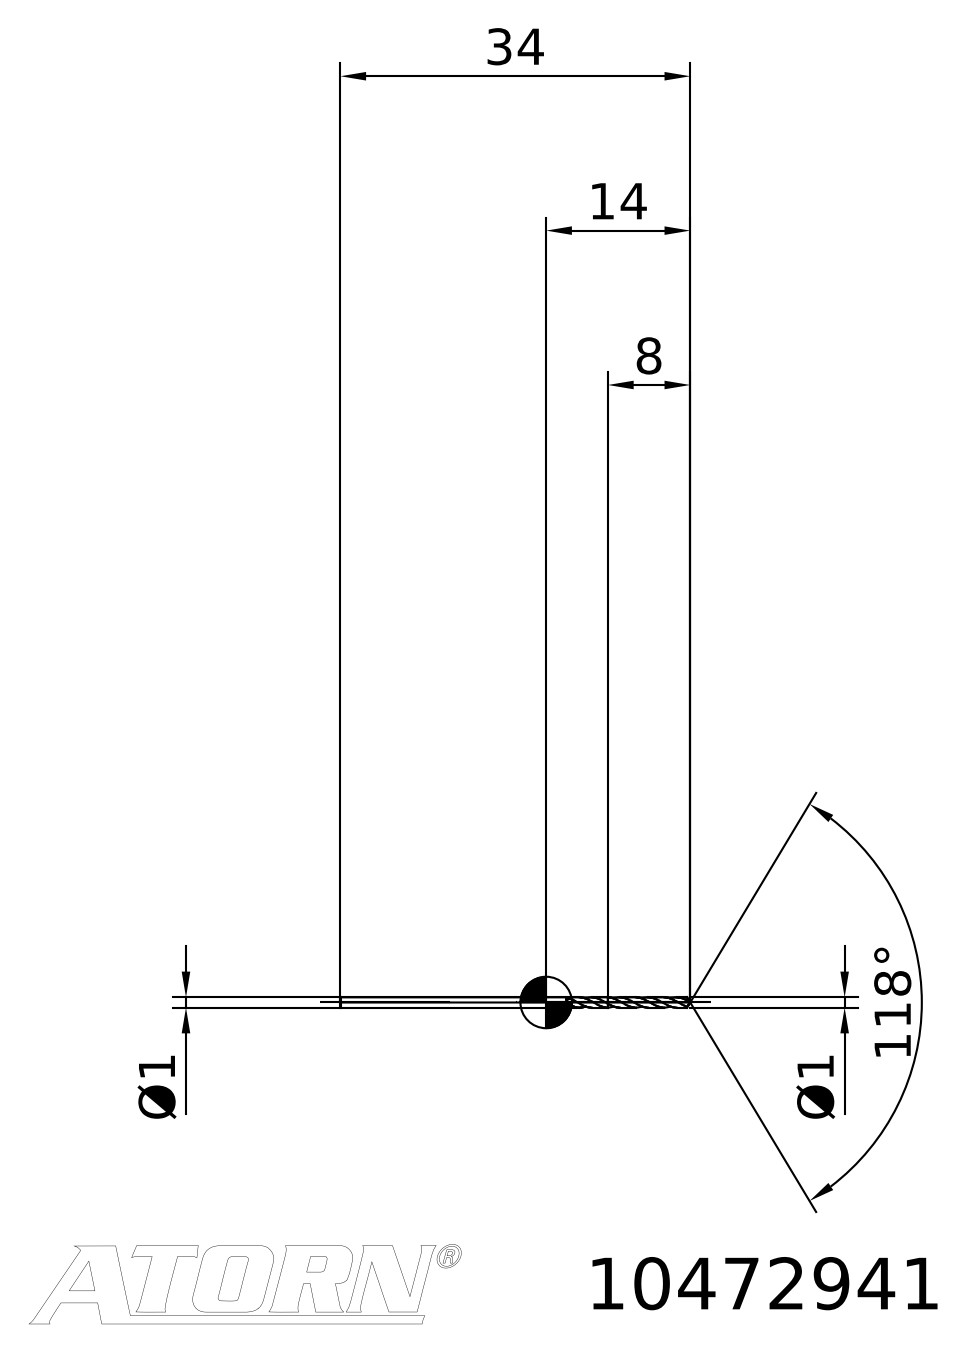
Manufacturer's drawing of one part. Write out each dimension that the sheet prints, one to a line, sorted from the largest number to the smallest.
118°
34
14
8
Ø1
Ø1
